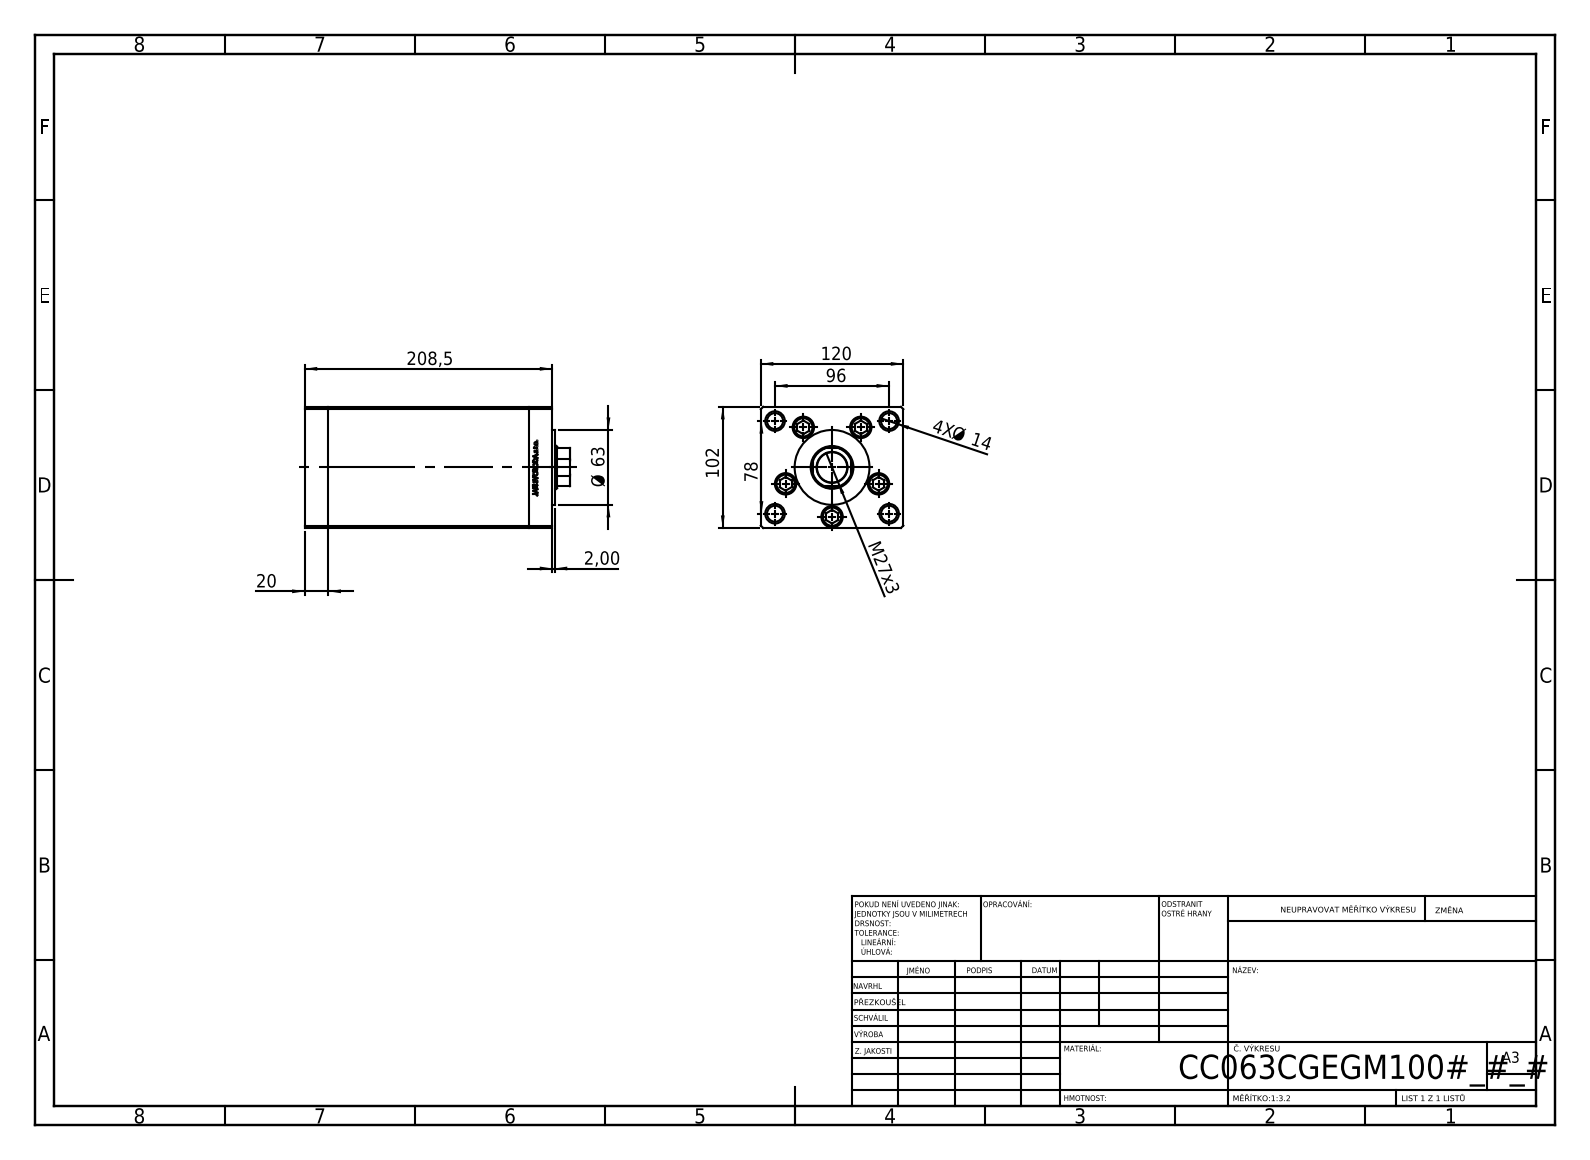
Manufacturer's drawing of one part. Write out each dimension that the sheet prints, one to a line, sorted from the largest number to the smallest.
208,5
120
102
96
78
Ø 63
M27x3
20
4X Ø 14
2,00
